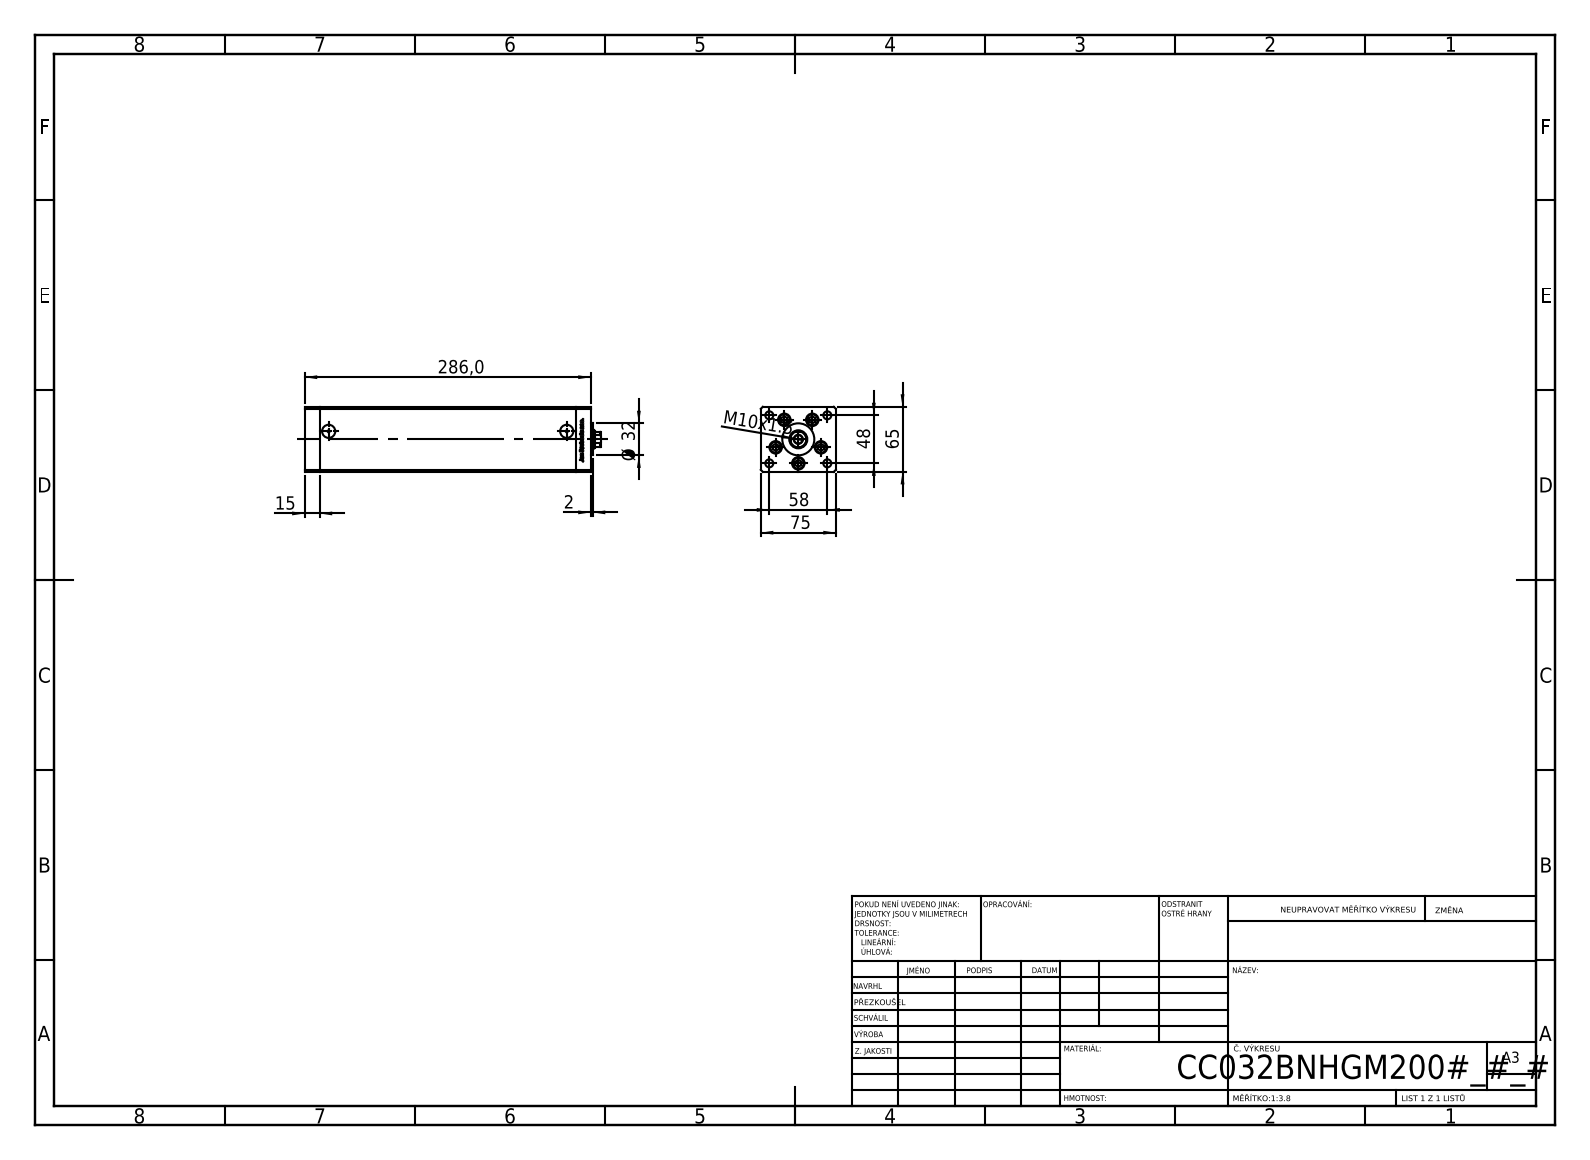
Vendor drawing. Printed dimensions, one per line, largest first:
286,0
75
65
58
48
Ø 32
15
M10x1.5
2
